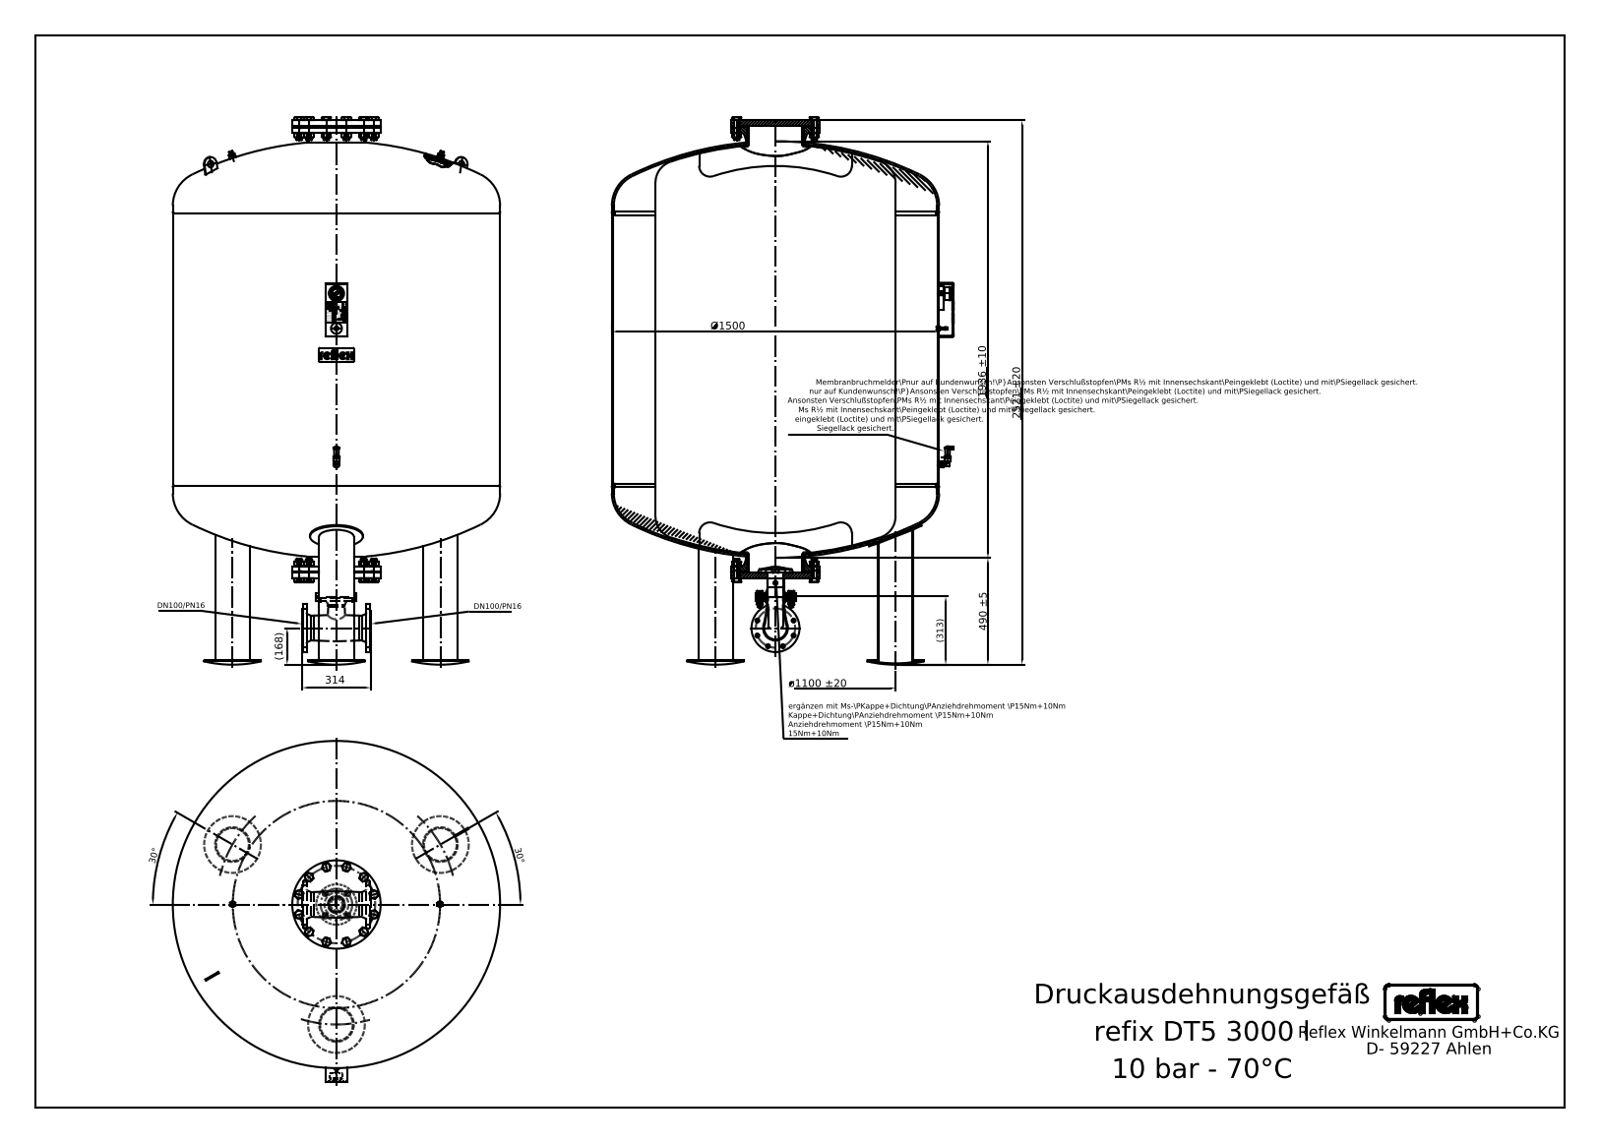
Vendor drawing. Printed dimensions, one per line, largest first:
2521 ±20
1936 ±10
Ø1500
ø1100 ±20
490 ±5
314
(313)
(168)
30°
30°
